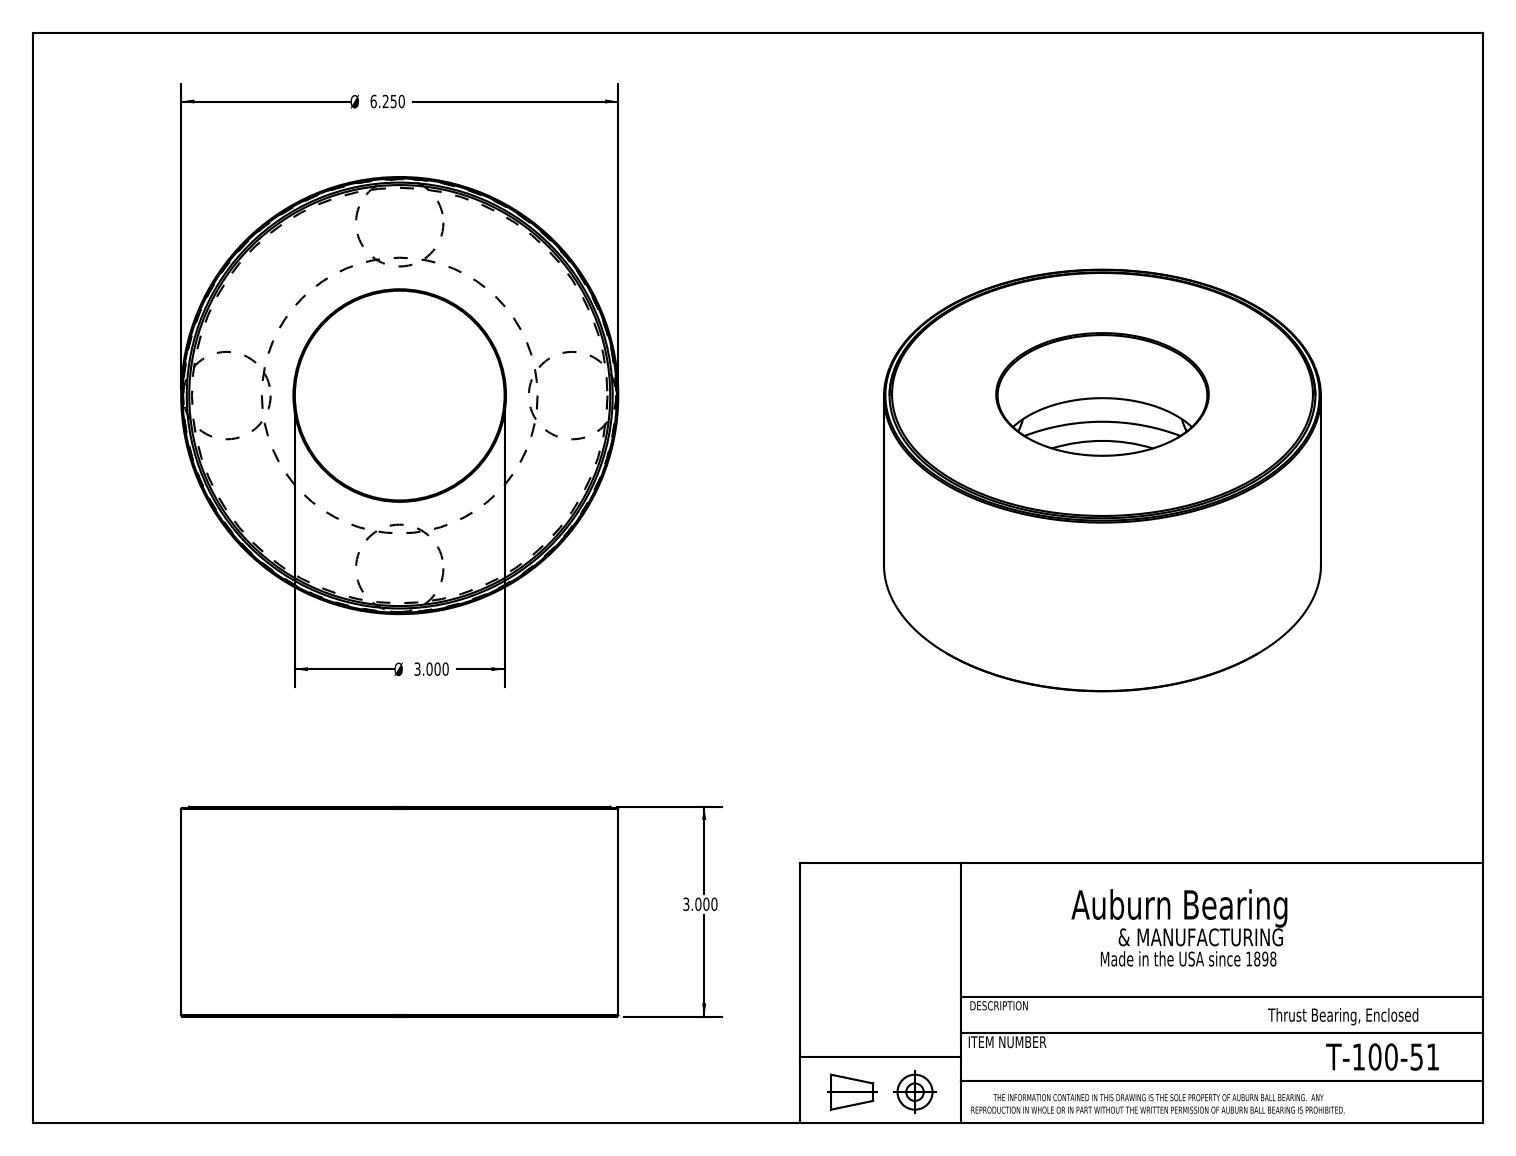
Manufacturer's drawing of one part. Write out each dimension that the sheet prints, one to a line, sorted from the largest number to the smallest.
Ø 6.250
3.000
Ø 3.000
